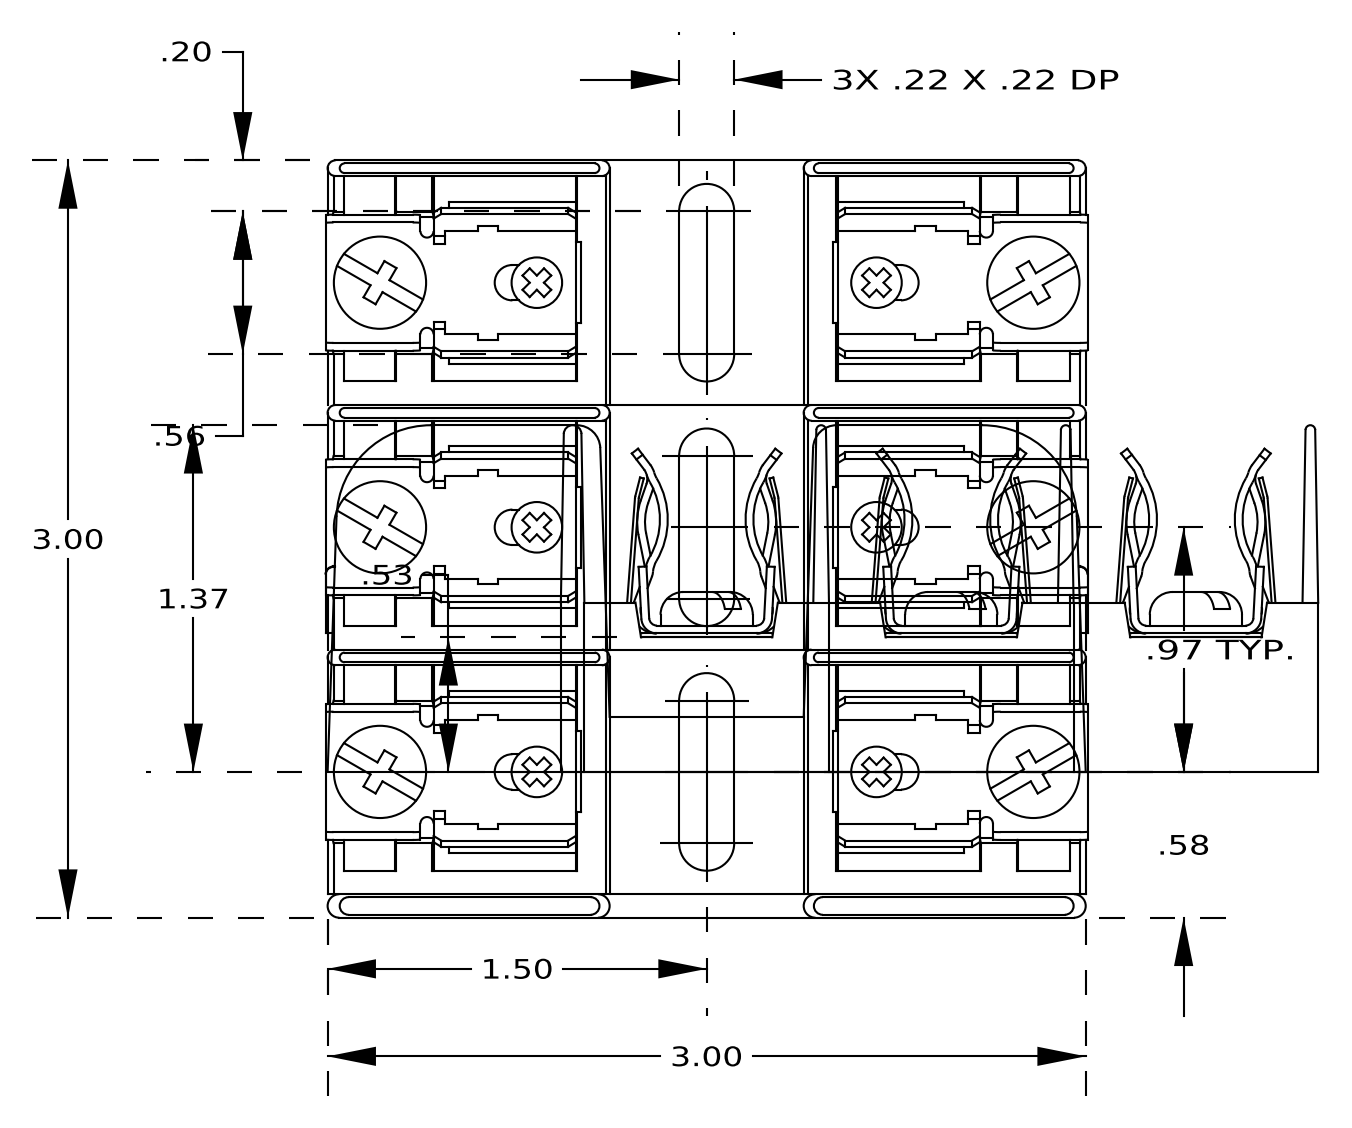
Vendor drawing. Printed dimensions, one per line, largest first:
3.00
3.00
1.50
1.37
.97 TYP.
.58
.56
.53
3X .22 X .22 DP
.20
